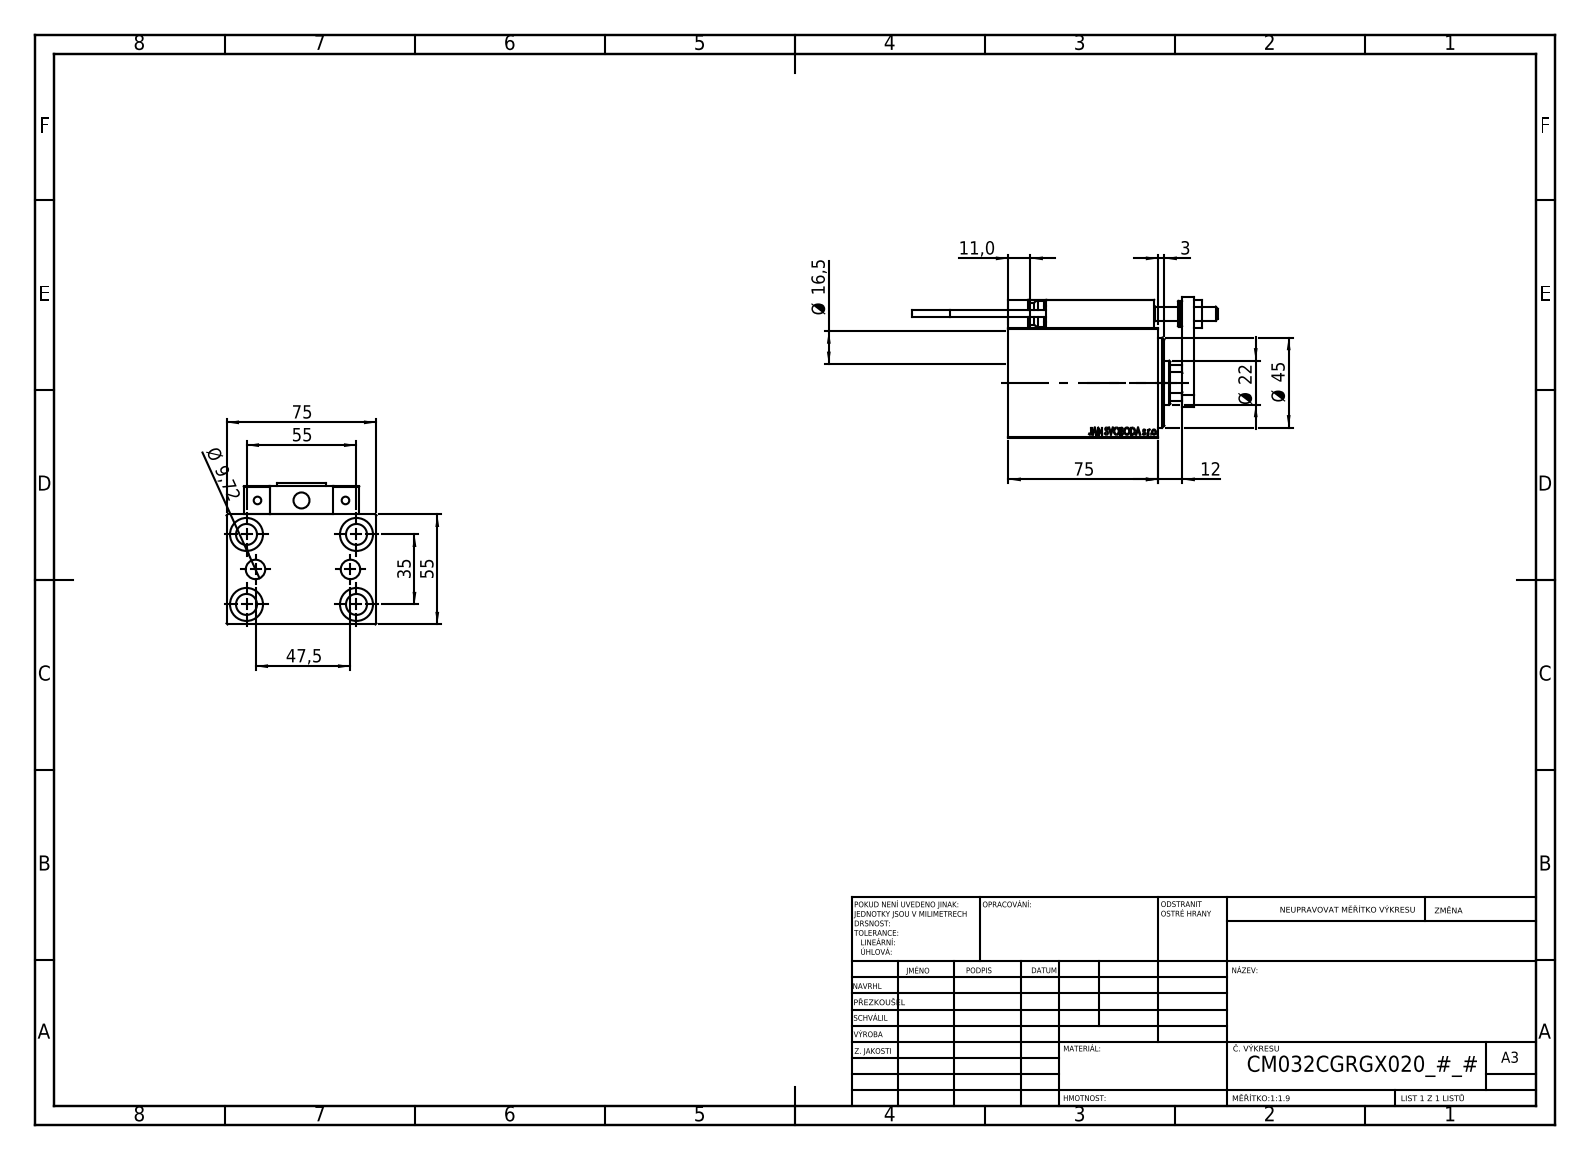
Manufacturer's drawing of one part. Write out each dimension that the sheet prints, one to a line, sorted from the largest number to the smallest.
75
75
55
55
47,5
Ø 45
35
Ø 22
Ø 16,5
12
11,0
Ø 9,72
3
